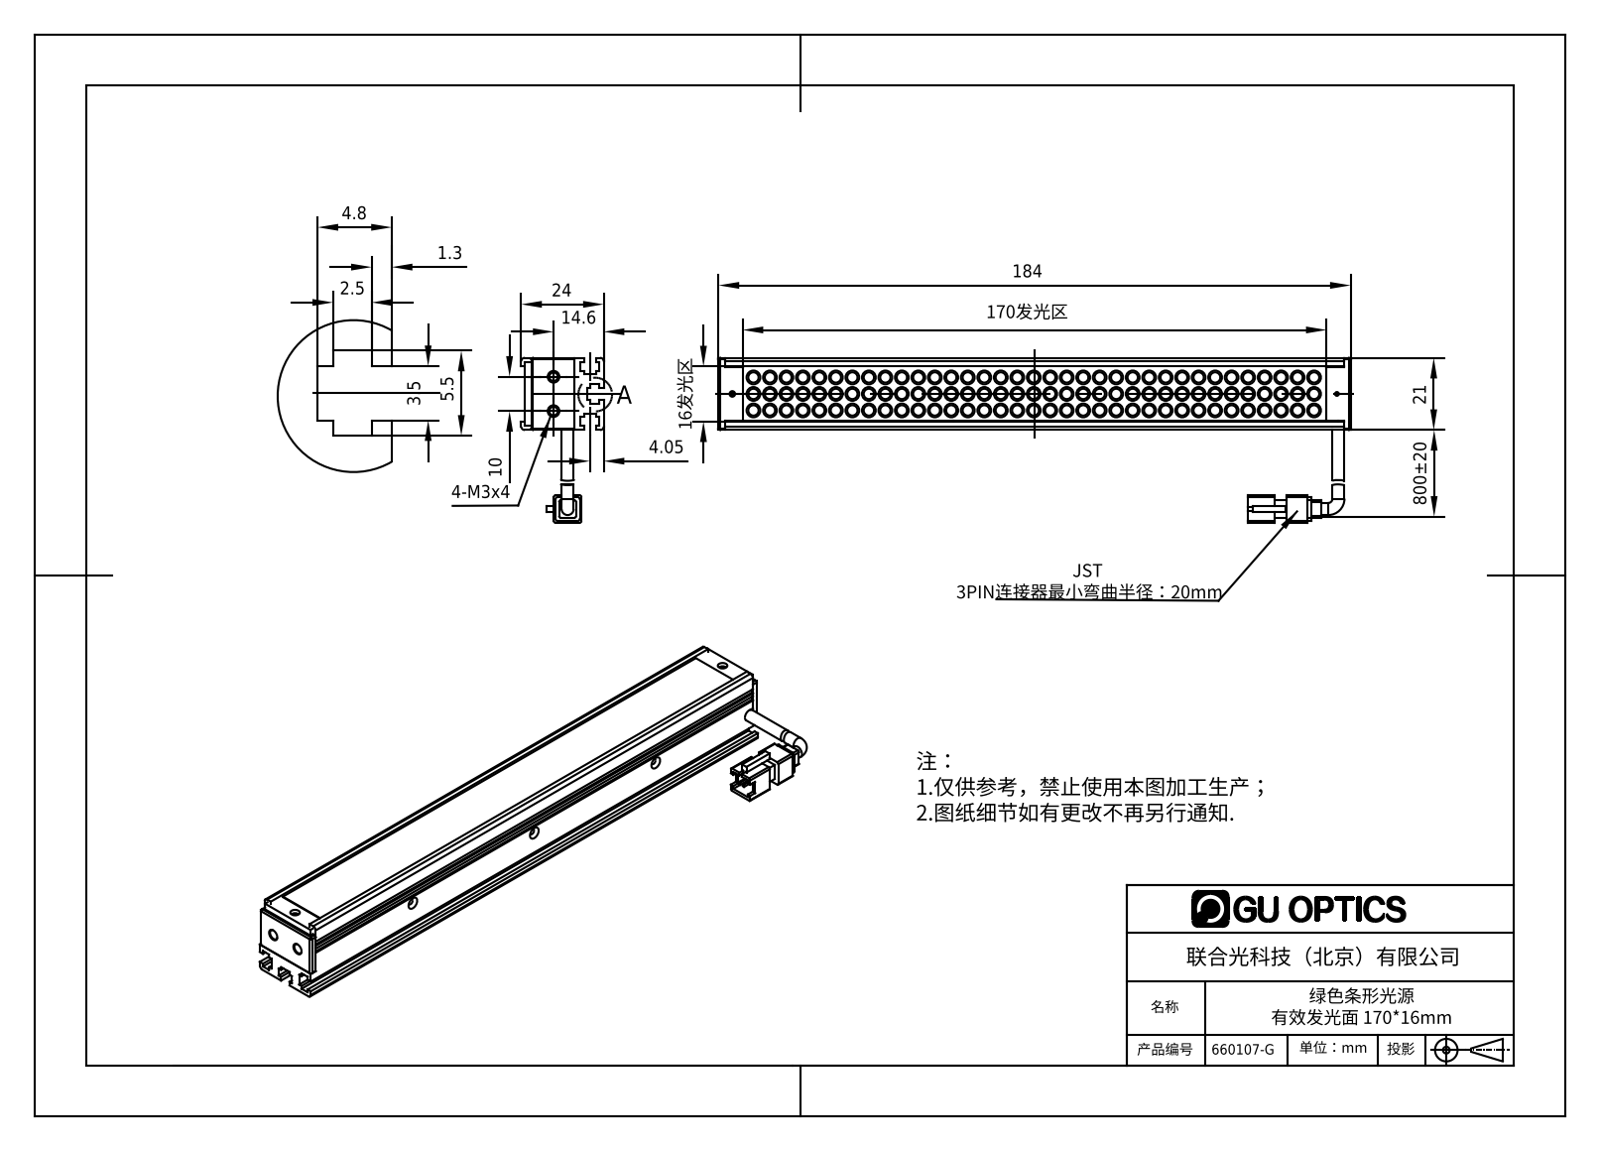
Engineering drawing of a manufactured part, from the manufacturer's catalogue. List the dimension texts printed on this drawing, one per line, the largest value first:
800±20
184
170发光区
24
21
16发光区
14.6
10
5.5
4.8
4.05
3.5
2.5
1.3
